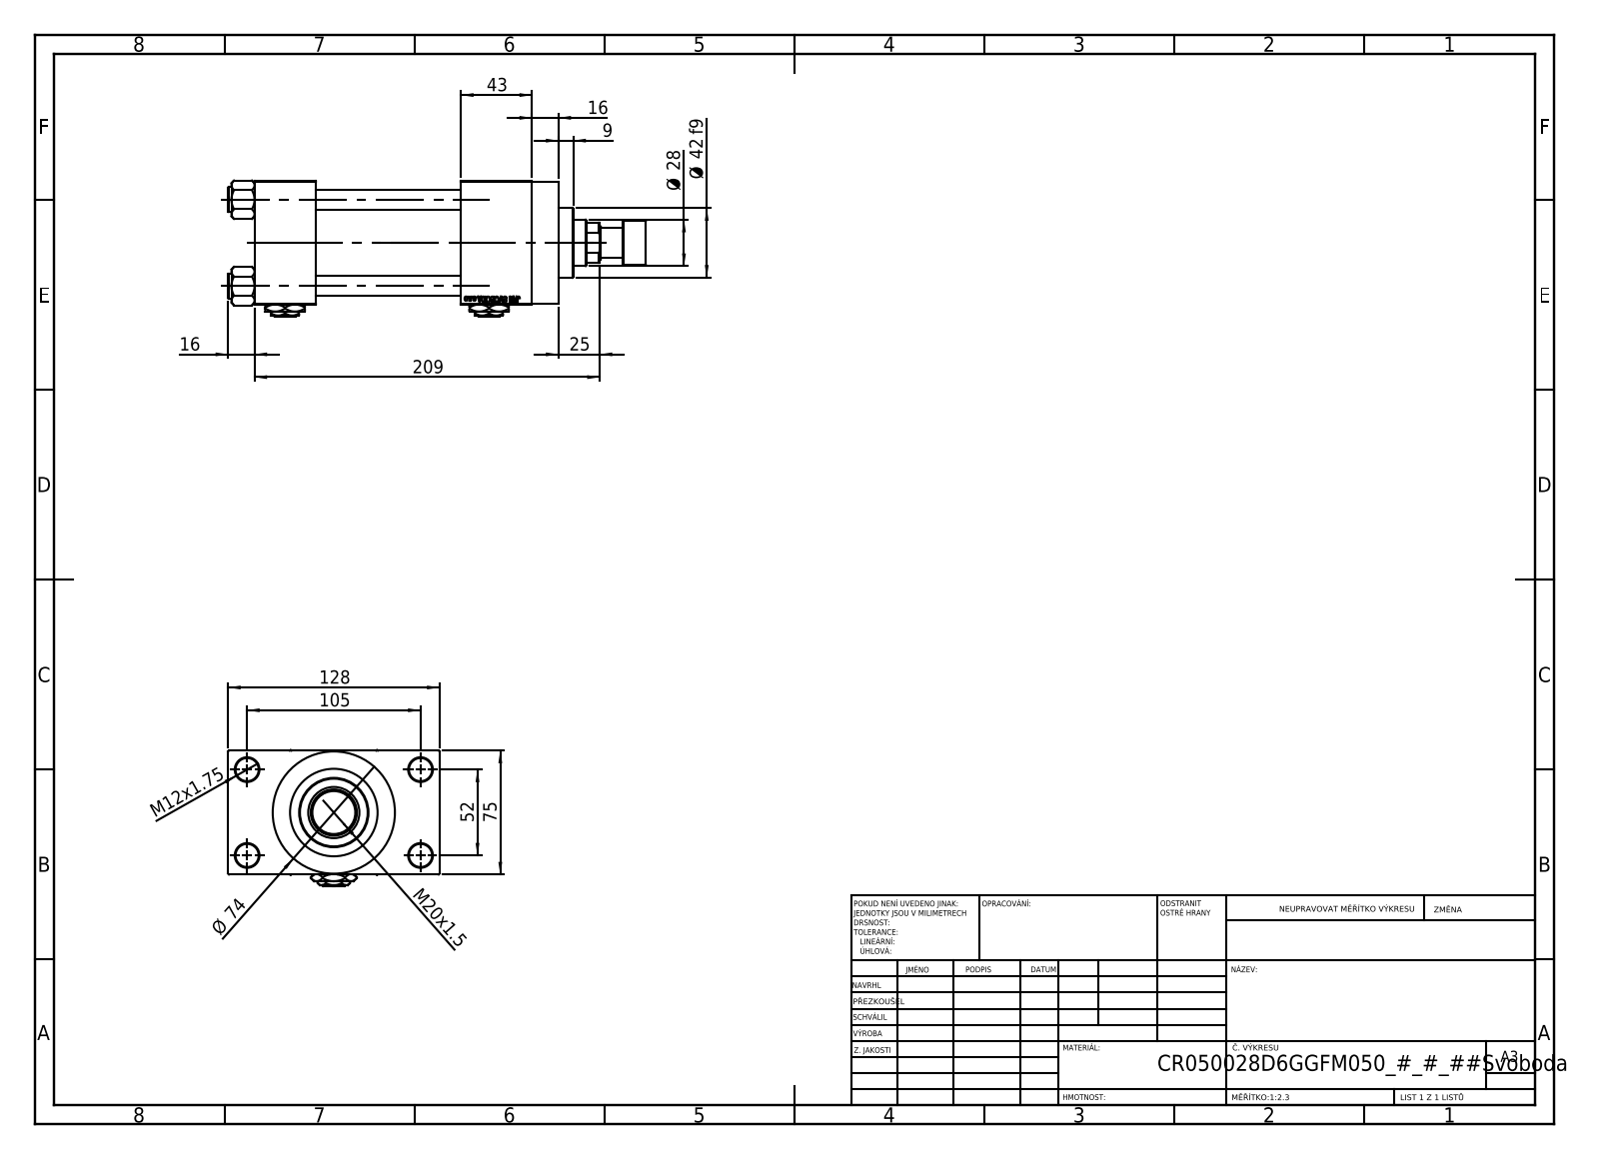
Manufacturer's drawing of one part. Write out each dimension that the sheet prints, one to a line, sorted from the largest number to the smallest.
209
128
105
75
Ø 74
52
43
Ø 42 f9
Ø 28
25
M20x1.5
16
16
M12x1.75
9
